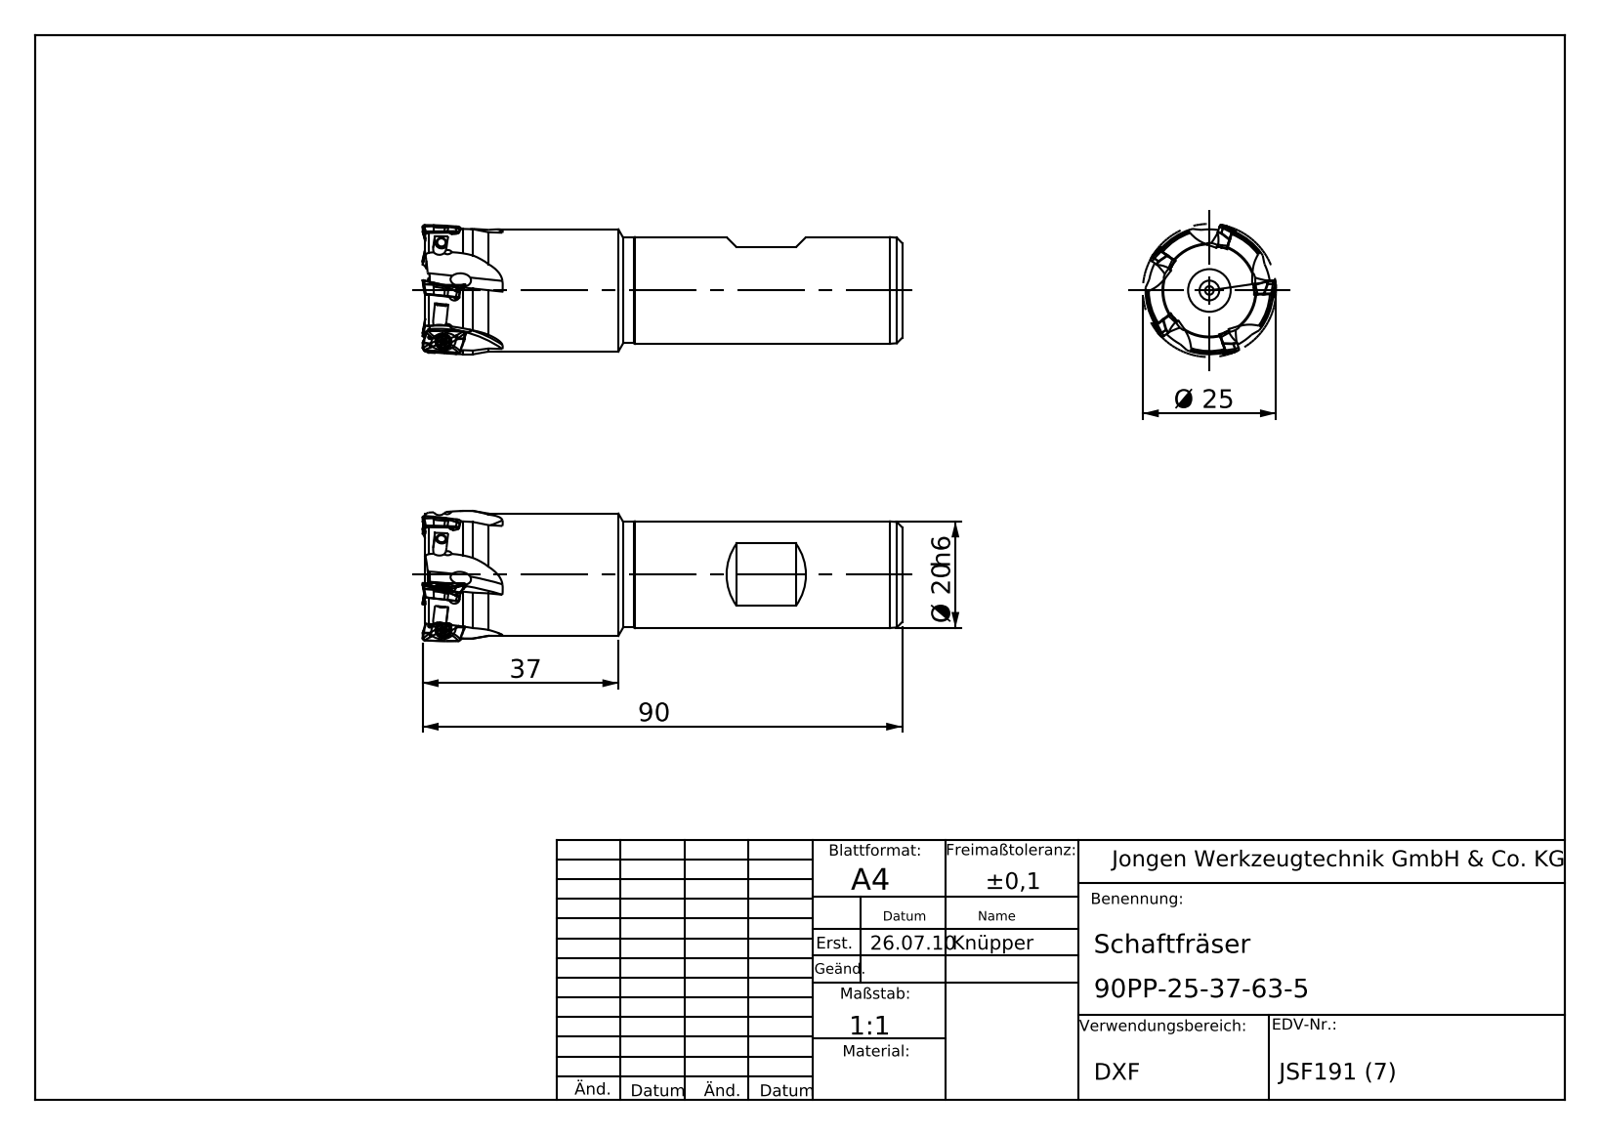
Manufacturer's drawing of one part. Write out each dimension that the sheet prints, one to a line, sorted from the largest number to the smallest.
90
37
Ø 25
Ø 20 h6
